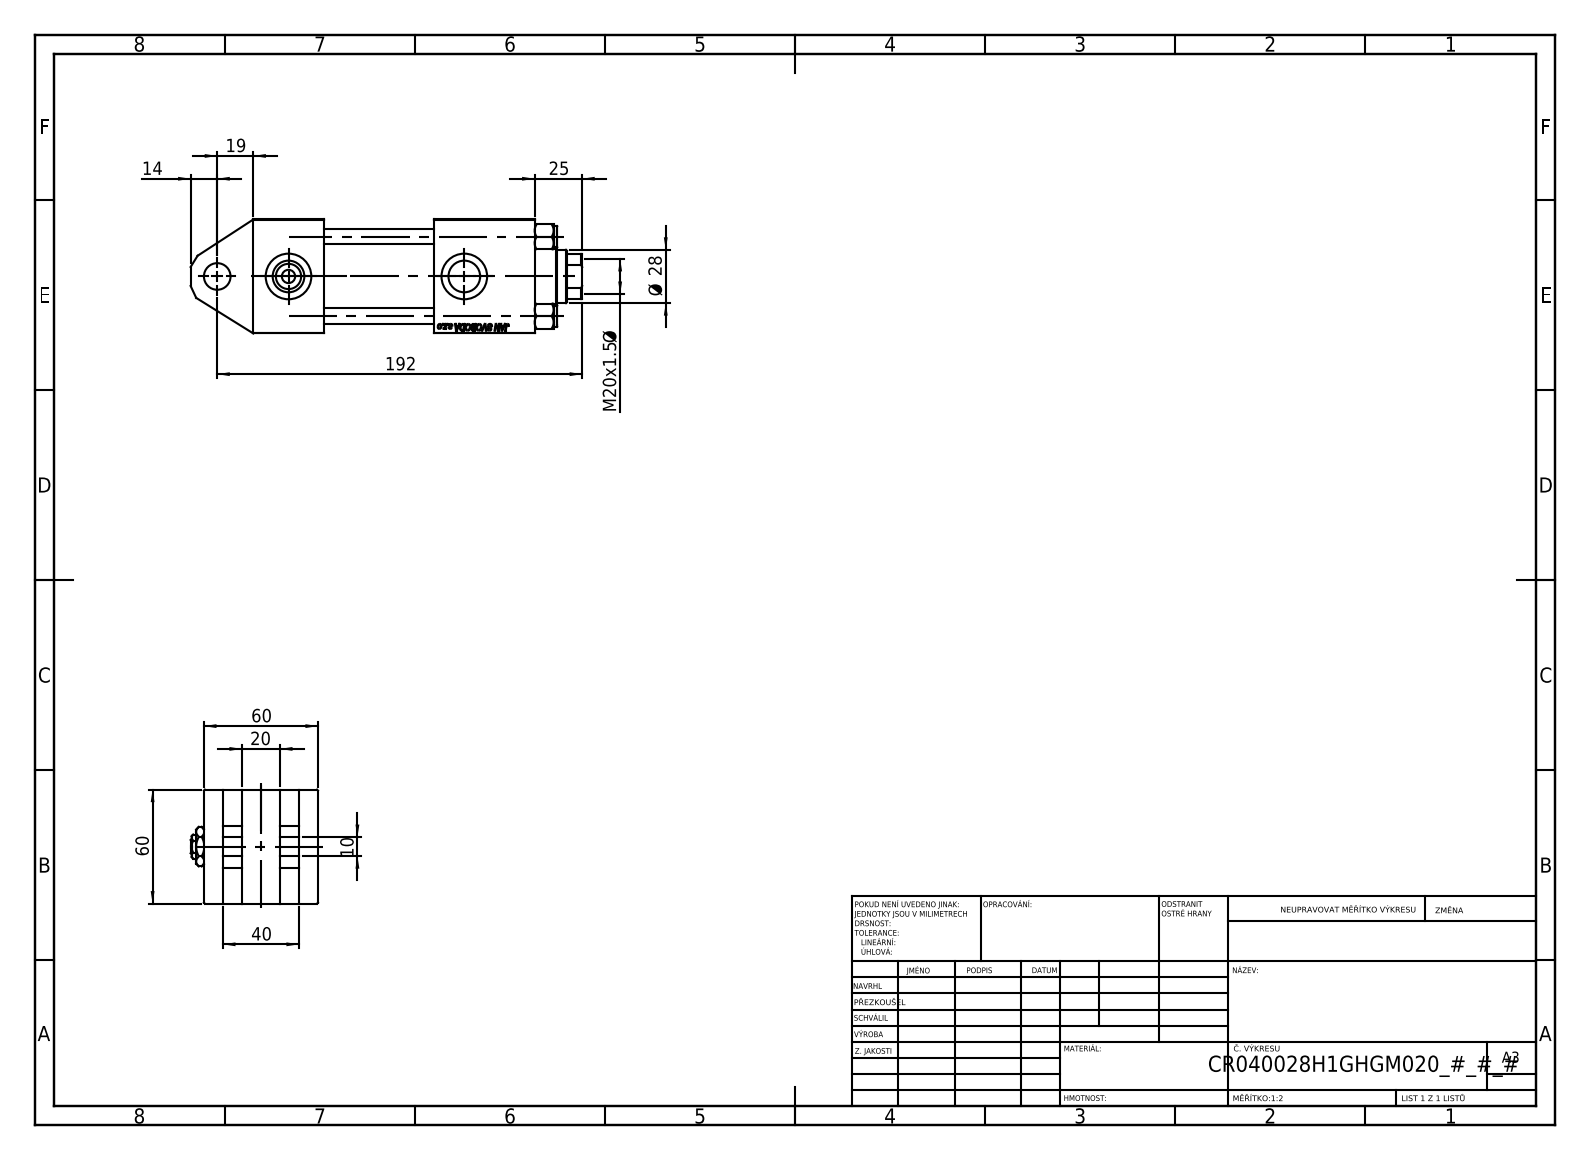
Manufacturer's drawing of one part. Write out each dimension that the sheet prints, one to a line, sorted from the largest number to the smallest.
192
60
60
40
Ø 28
25
M20x1.5 Ø
20
19
14
10
